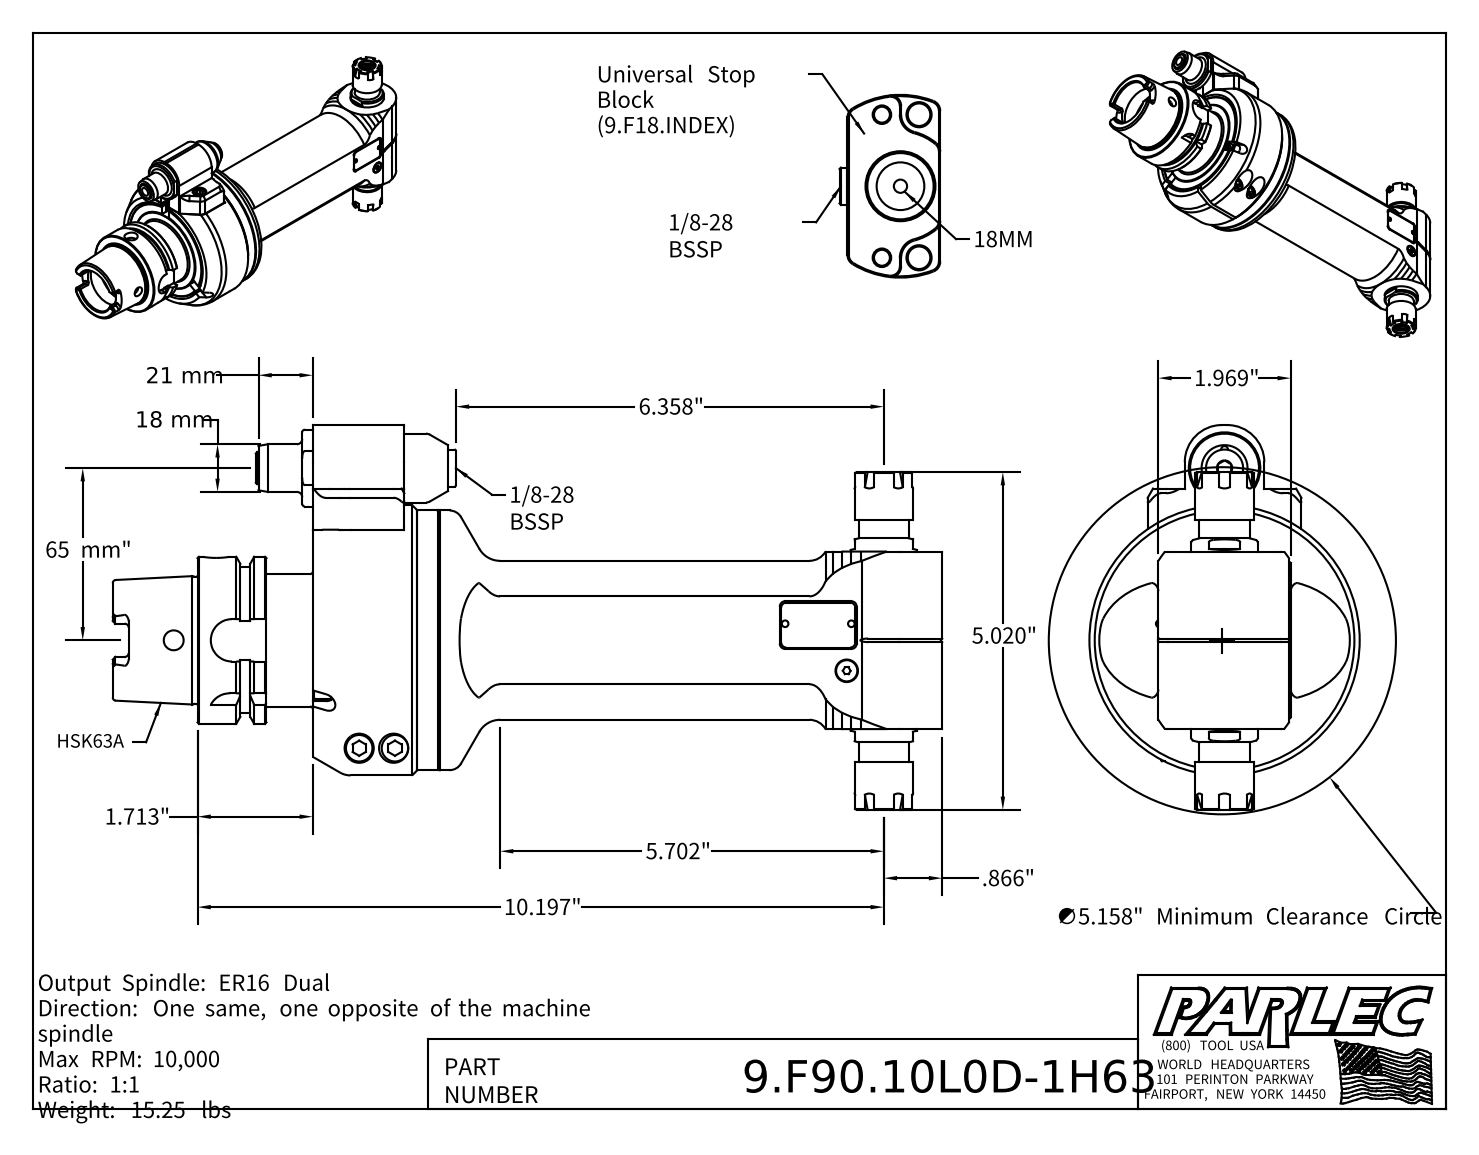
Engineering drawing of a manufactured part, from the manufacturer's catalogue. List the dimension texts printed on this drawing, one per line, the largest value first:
65 mm"
21 mm
18 mm
10.197"
6.358"
5.702"
∅5.158" Minimum Clearance Circle
5.020"
1.969"
1.713"
.866"
